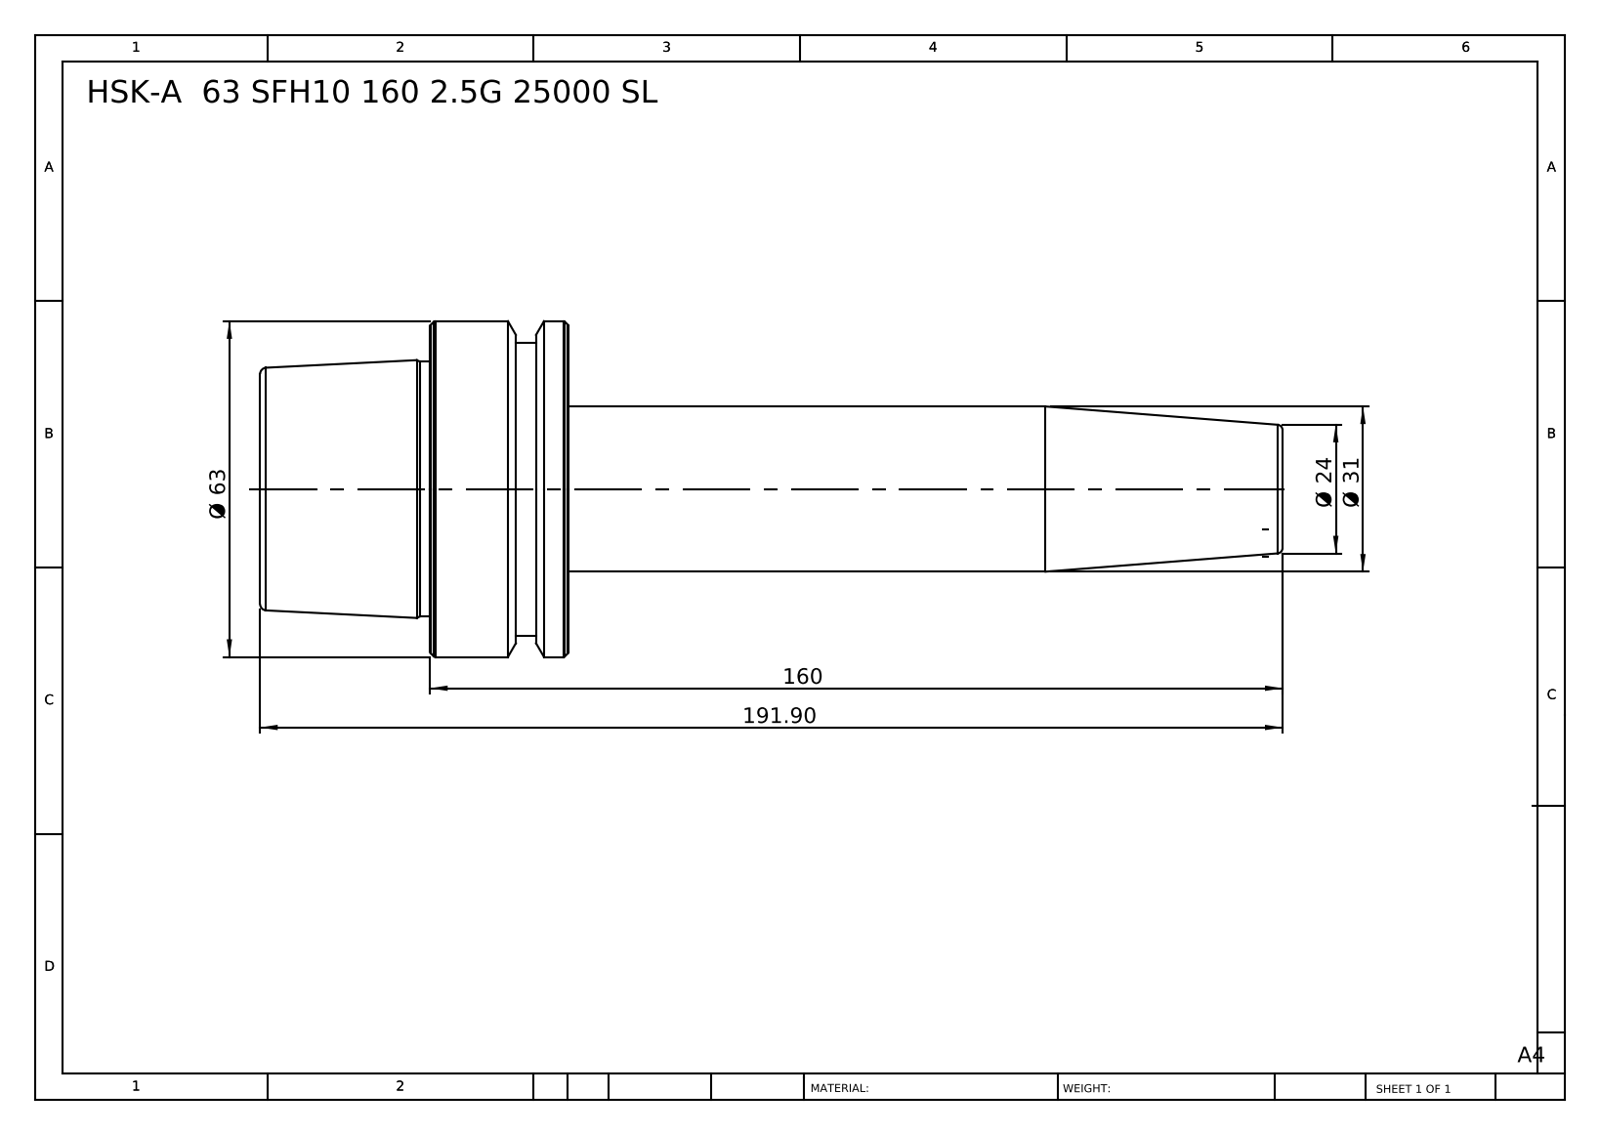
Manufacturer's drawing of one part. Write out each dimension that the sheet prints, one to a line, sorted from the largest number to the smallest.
191.90
160
Ø 63
Ø 31
Ø 24
